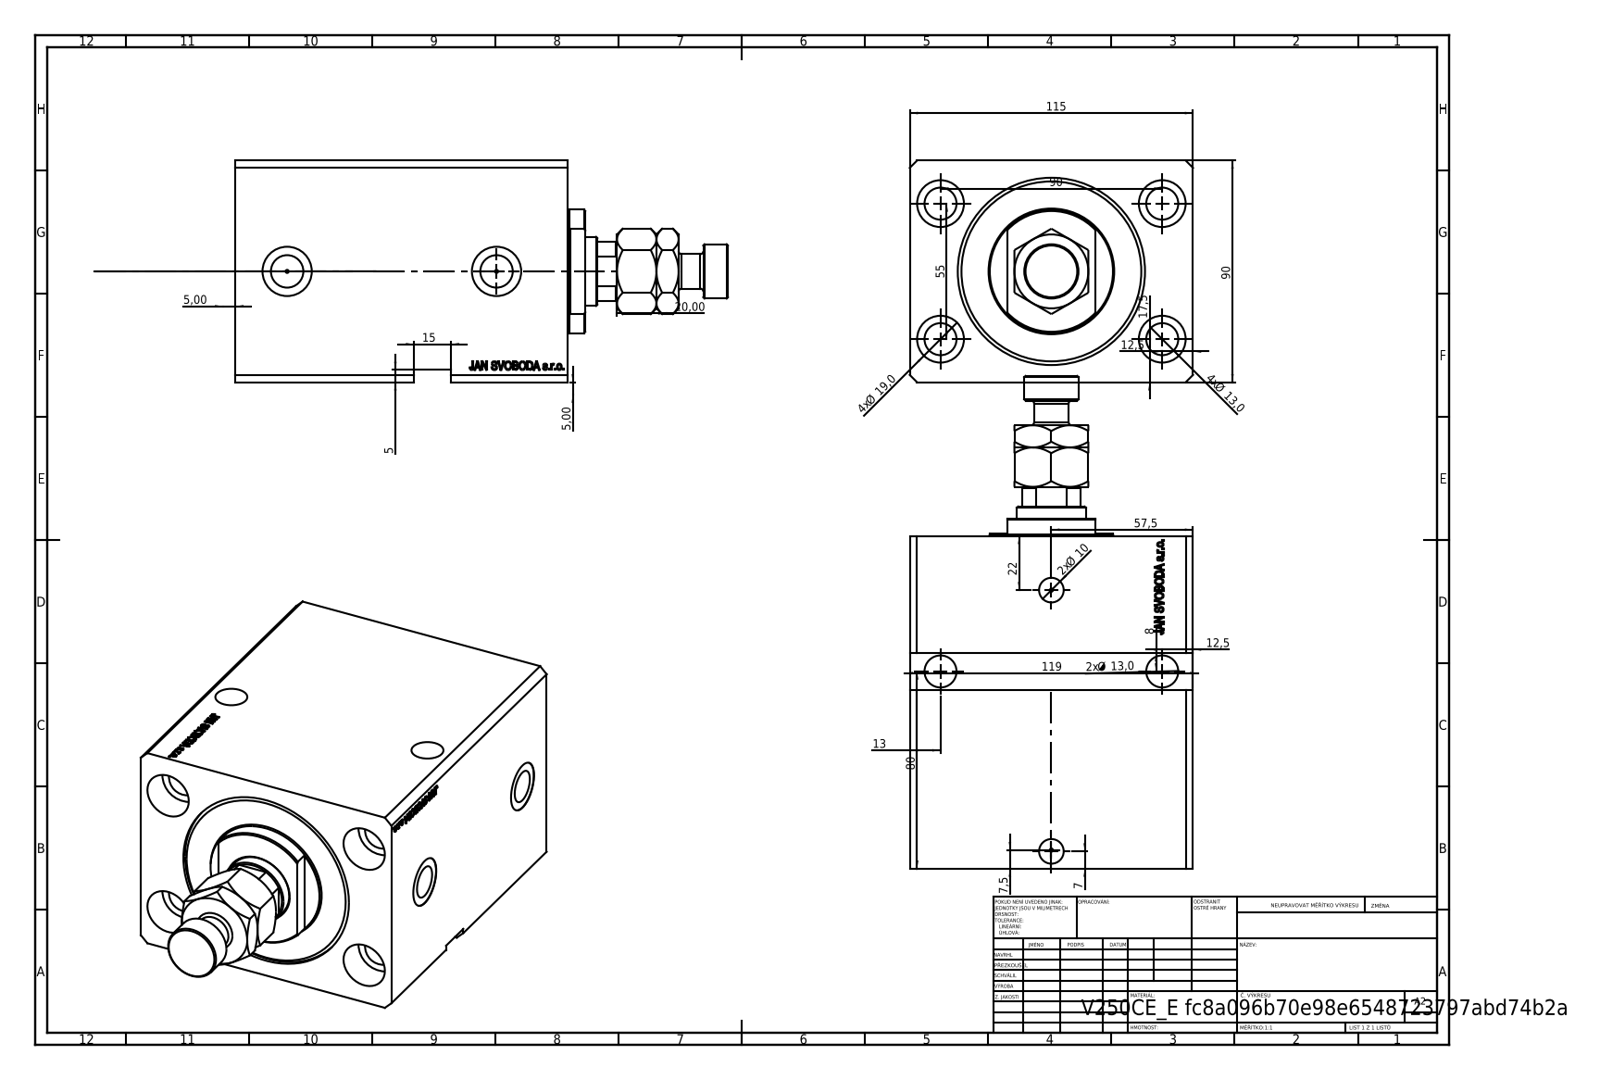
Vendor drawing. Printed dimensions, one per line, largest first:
119
115
90
90
80
57,5
55
22
20,00
4x Ø 19,0
17,5
15
4x Ø 13,0
2x Ø 13,0
13
12,5
12,5
2x Ø 10
8
7,5
7
5,00
5,00
5
